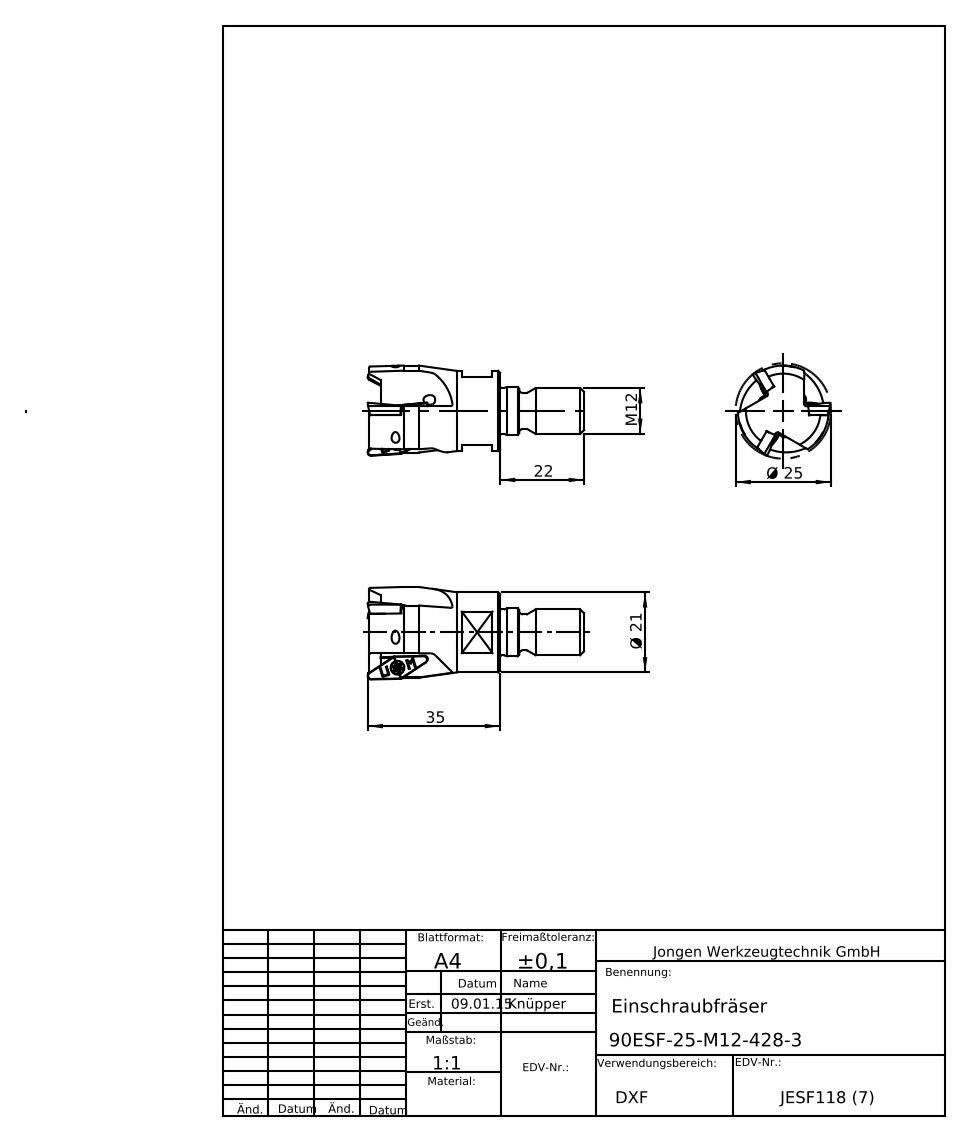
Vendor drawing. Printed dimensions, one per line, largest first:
35
Ø 25
22
Ø 21
M 12
